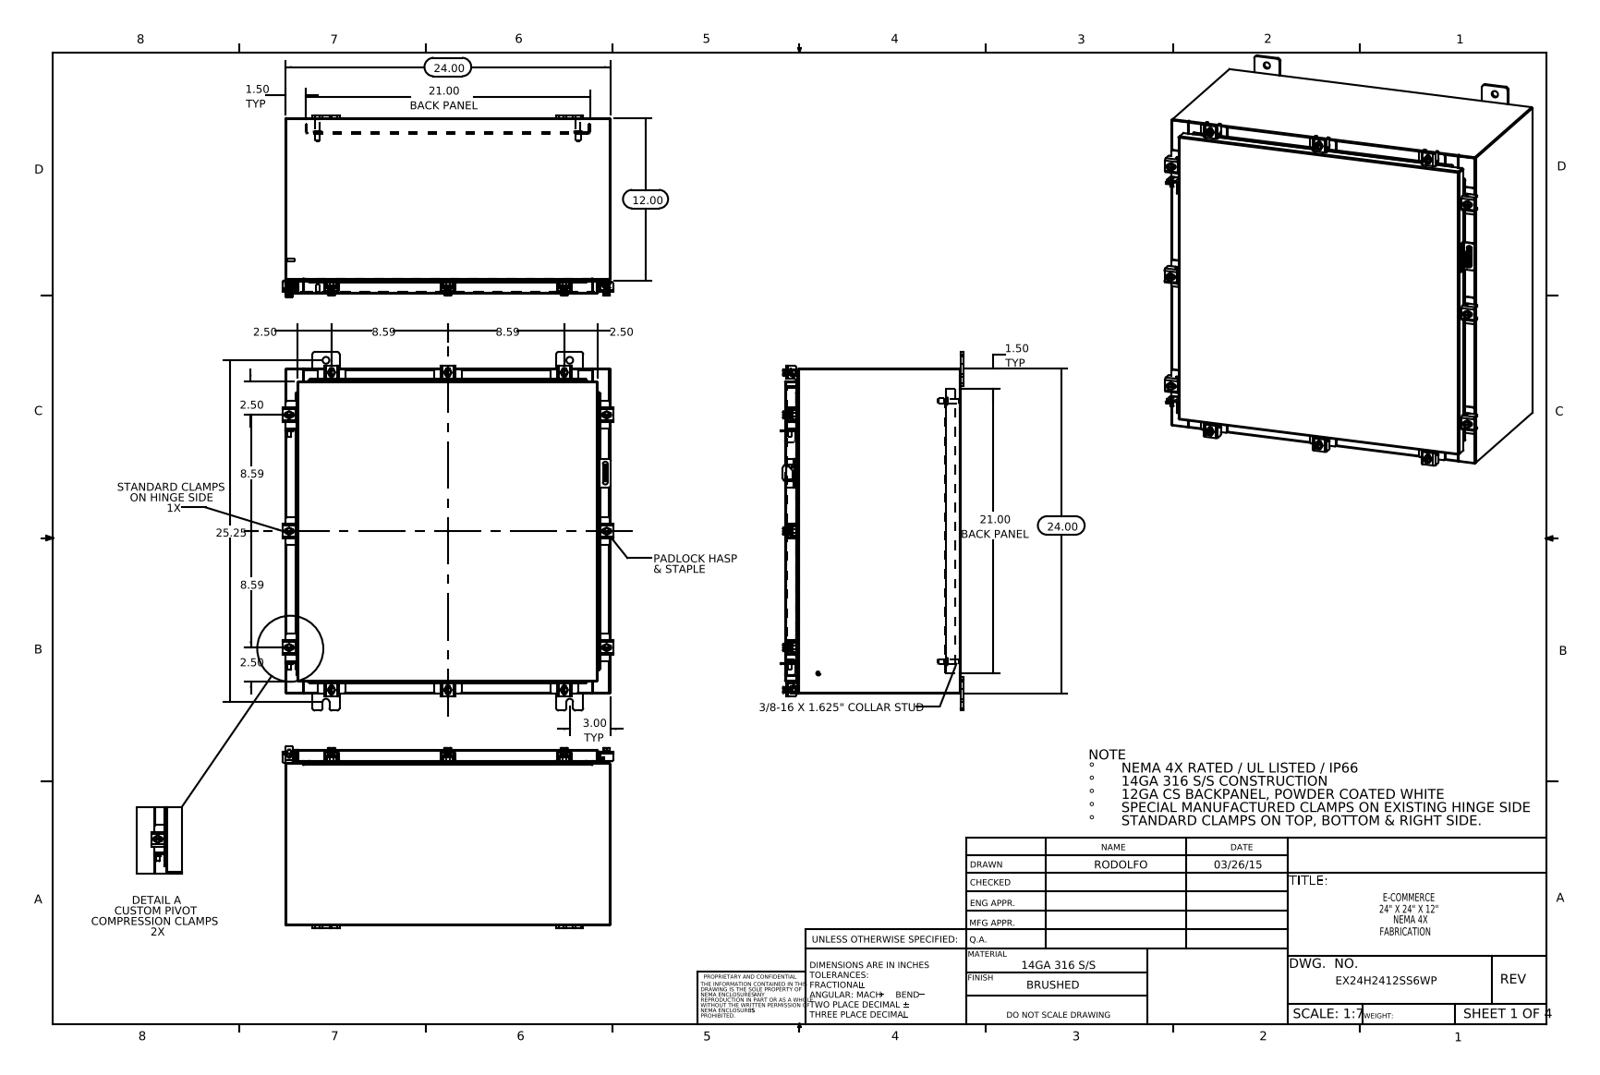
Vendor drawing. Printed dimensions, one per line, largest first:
25.25
24.00
24.00
21.00 BACK PANEL
21.00 BACK PANEL
12.00
8.59
8.59
8.59
8.59
3.00 TYP
2.50
2.50
2.50
2.50
1.50 TYP
1.50 TYP
